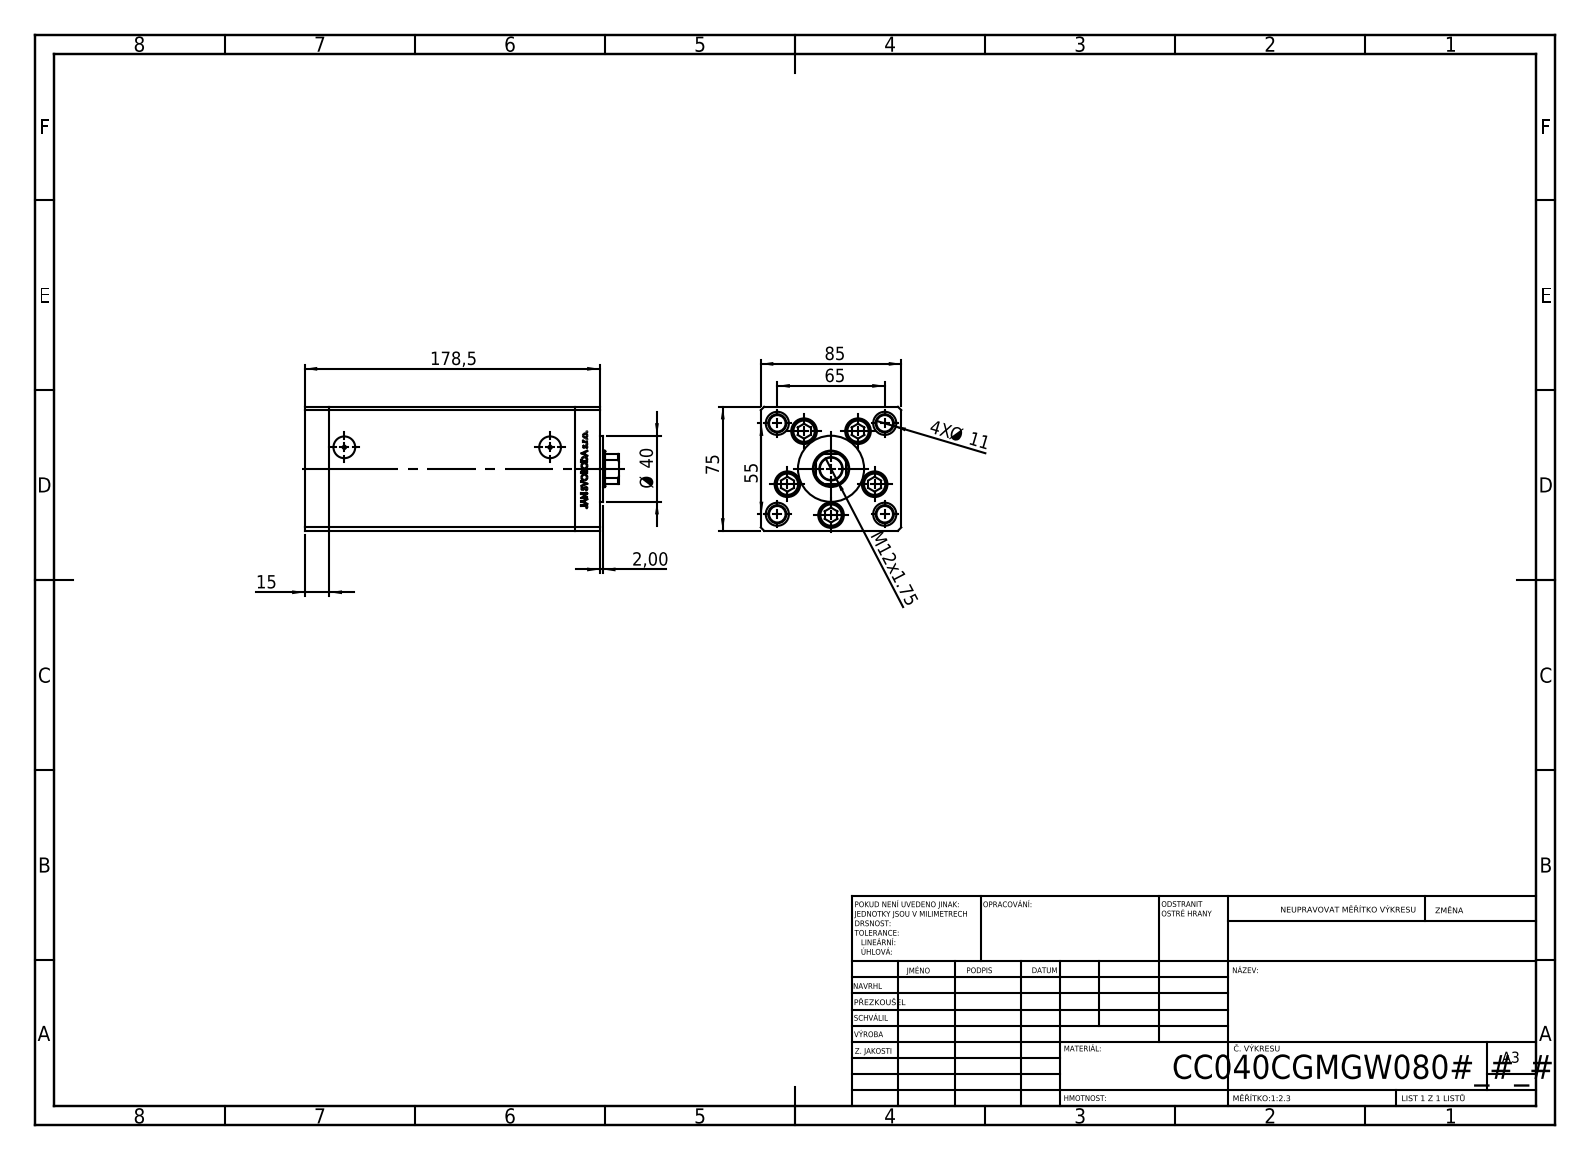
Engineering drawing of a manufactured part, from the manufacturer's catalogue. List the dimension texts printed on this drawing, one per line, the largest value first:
178,5
85
75
65
55
Ø 40
15
M12x1.75
4X Ø 11
2,00
